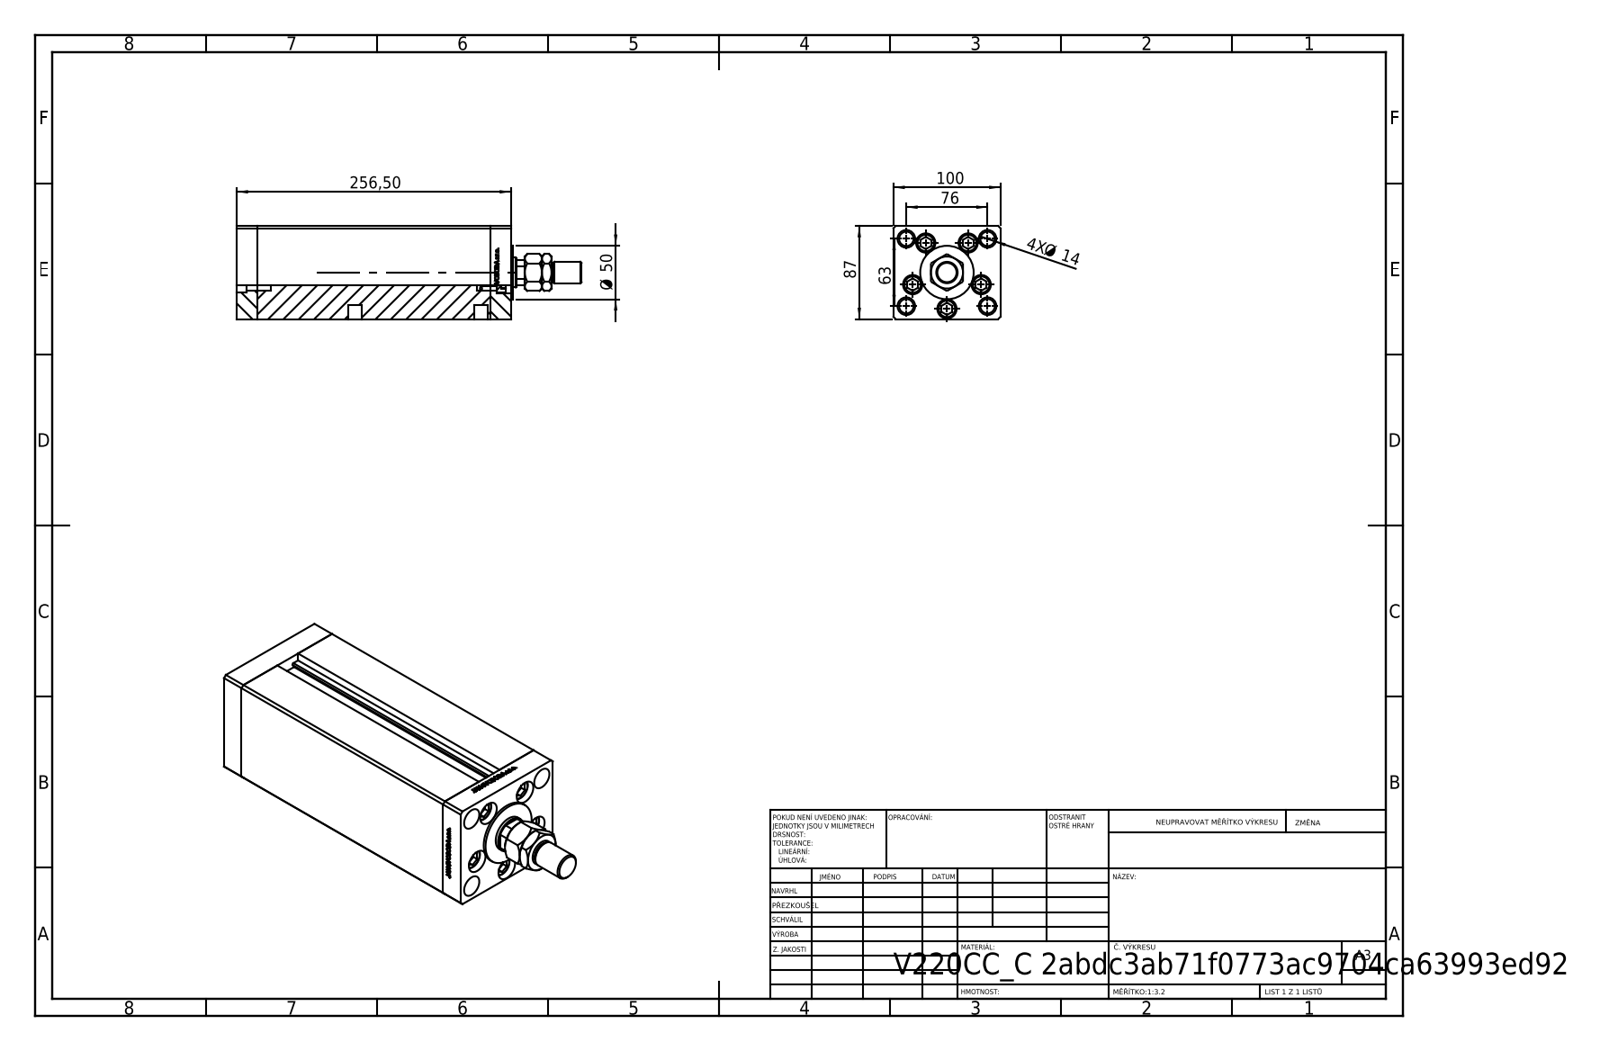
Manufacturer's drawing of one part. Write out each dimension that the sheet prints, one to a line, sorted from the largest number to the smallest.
256,50
100
87
76
63
Ø 50
4X Ø 14
